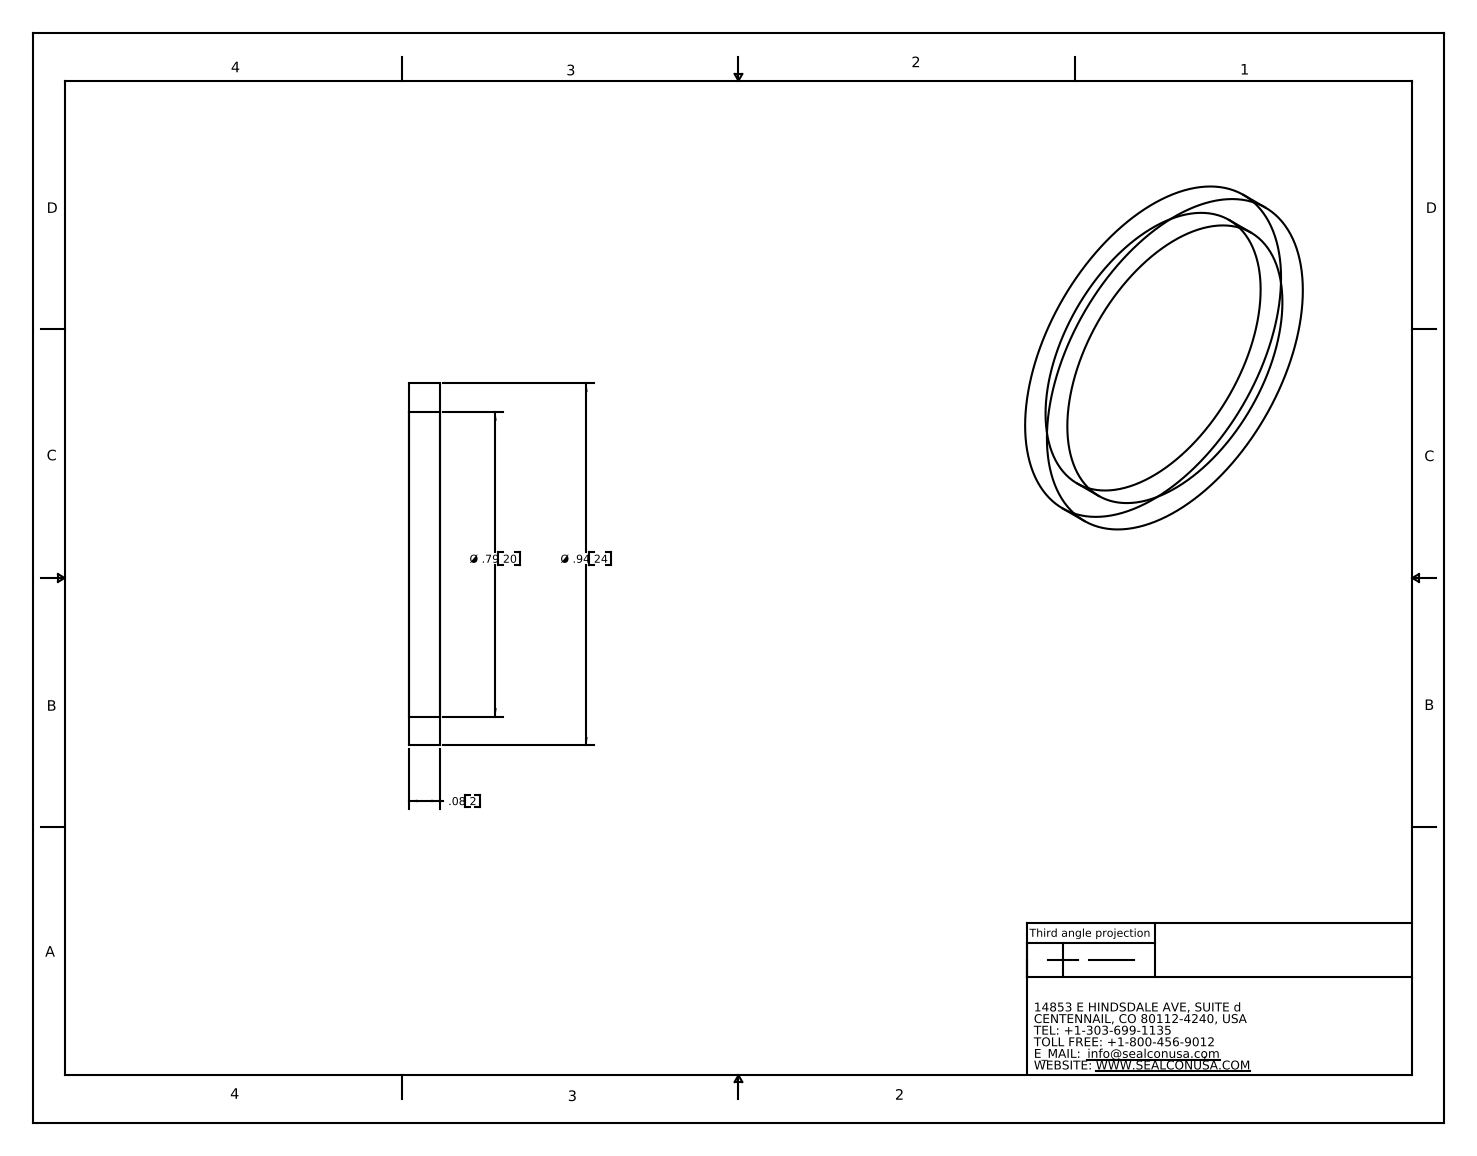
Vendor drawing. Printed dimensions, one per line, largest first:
Ø .94 24
Ø .79 20
.08 2
